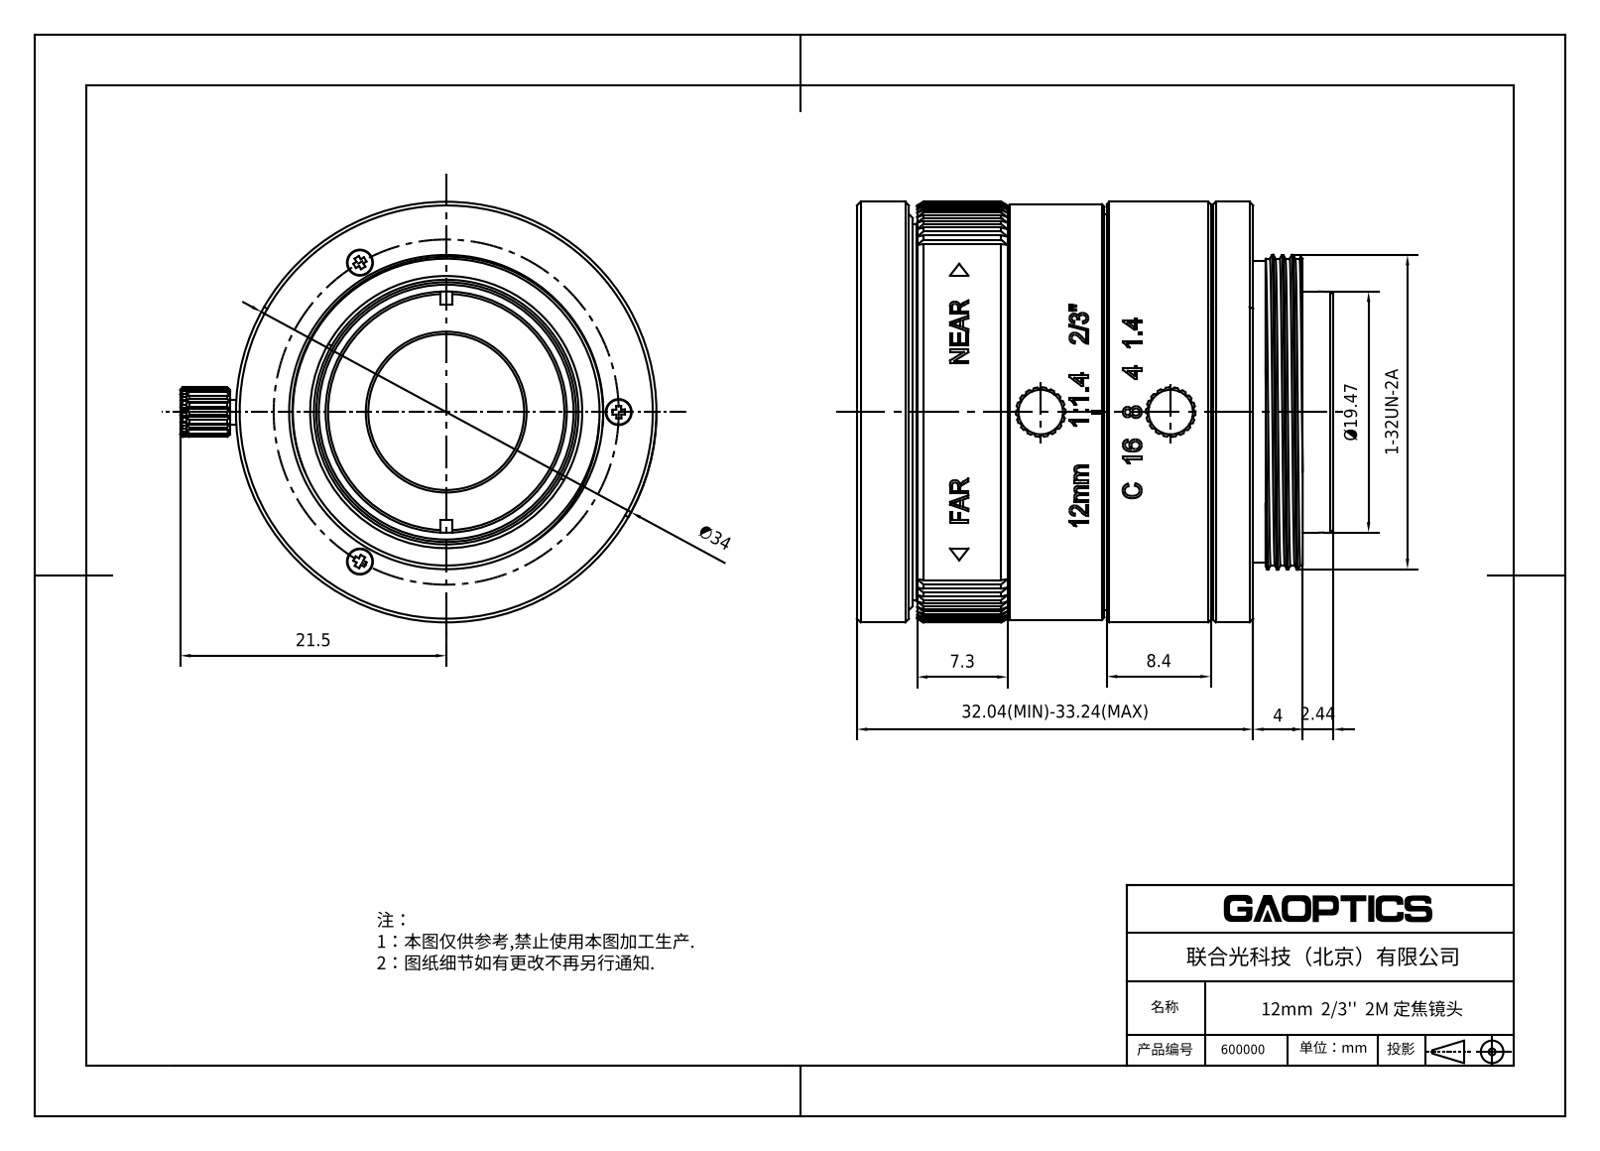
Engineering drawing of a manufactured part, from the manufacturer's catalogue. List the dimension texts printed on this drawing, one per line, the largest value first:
∅34
32.04(MIN)-33.24(MAX)
21.5
Ø19.47
8.4
7.3
4
2.44
1-32UN-2A
